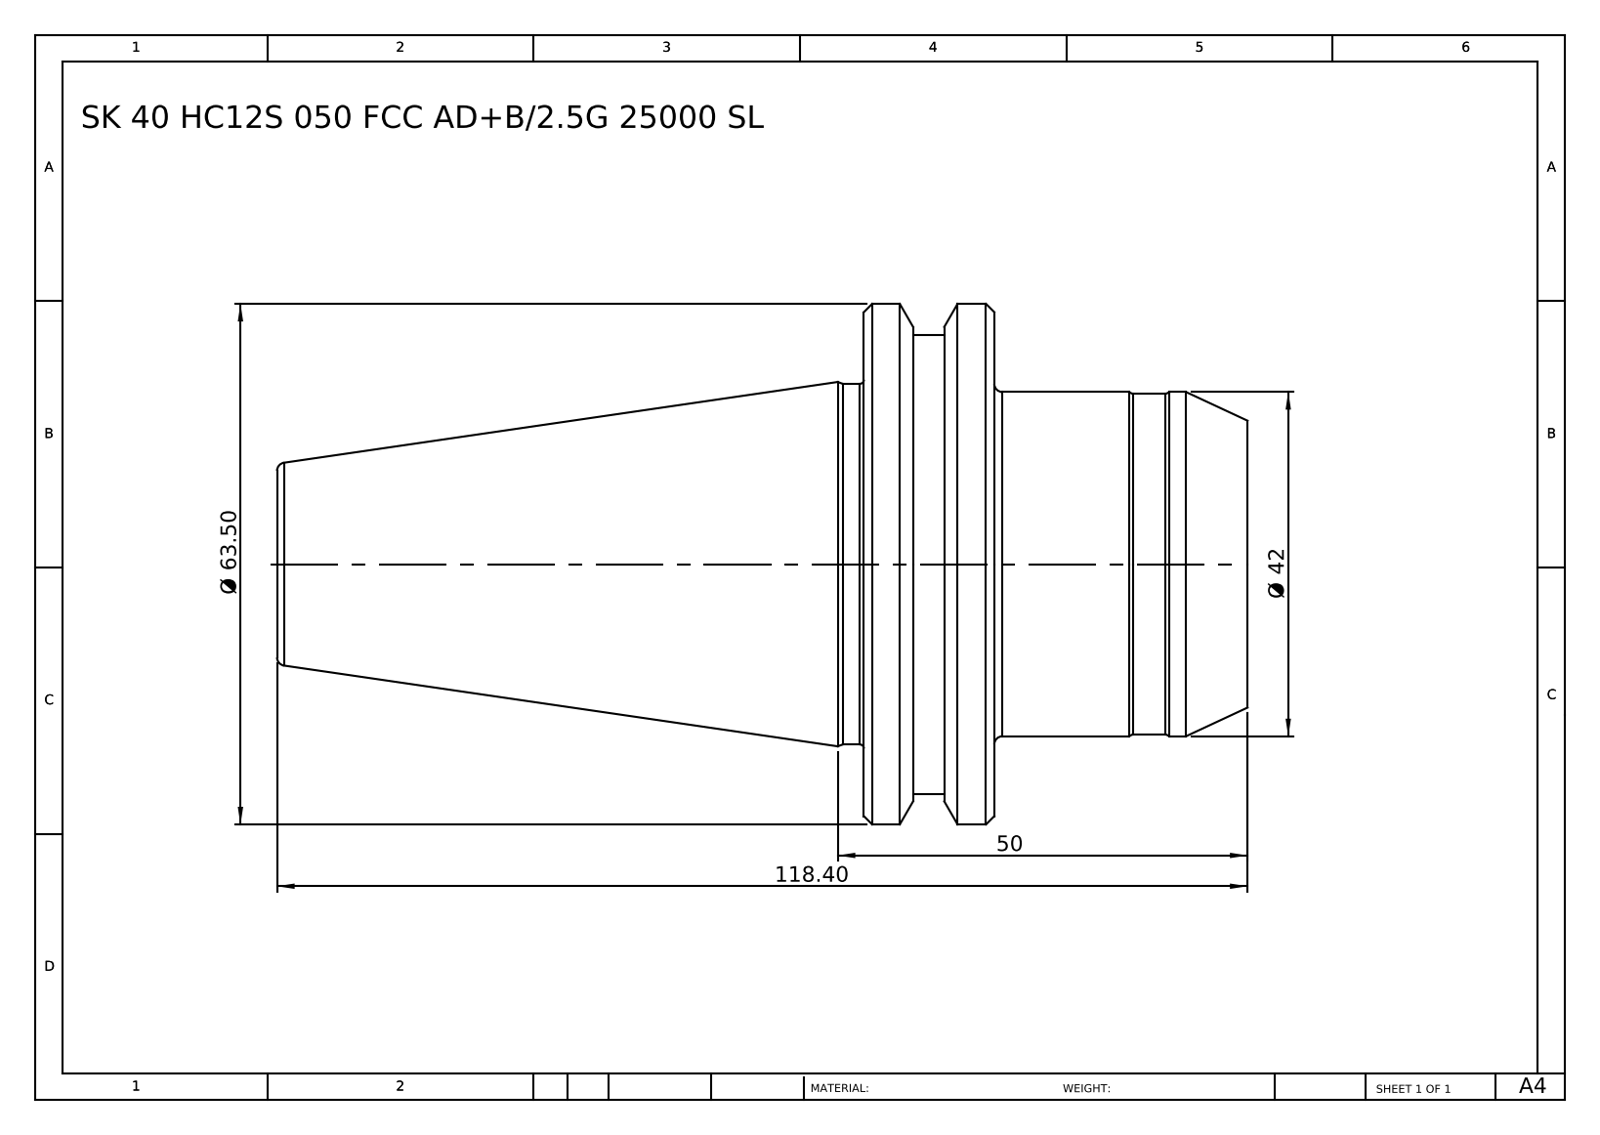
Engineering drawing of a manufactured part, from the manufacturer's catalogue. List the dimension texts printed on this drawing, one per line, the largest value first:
118.40
Ø 63.50
50
Ø 42
